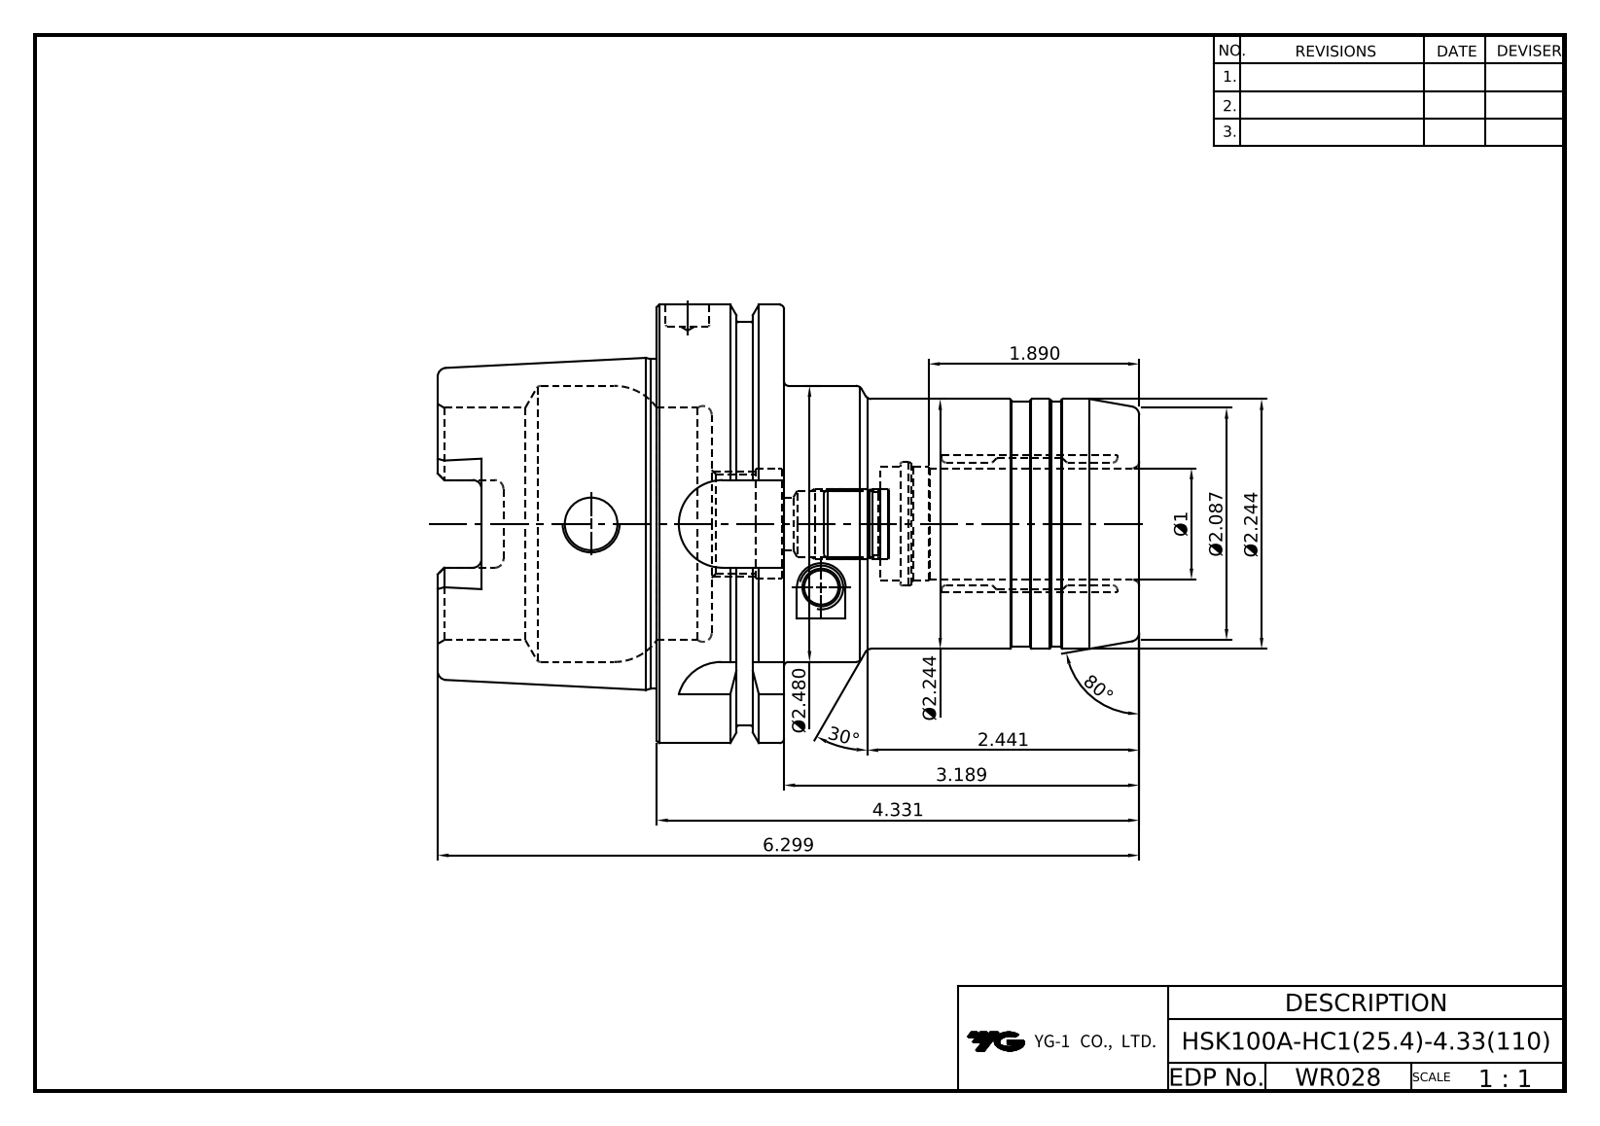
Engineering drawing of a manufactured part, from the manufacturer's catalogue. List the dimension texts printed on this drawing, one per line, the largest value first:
80°
30°
6.299
4.331
3.189
Ø2.480
2.441
Ø2.244
Ø2.244
Ø2.087
1.890
Ø1
